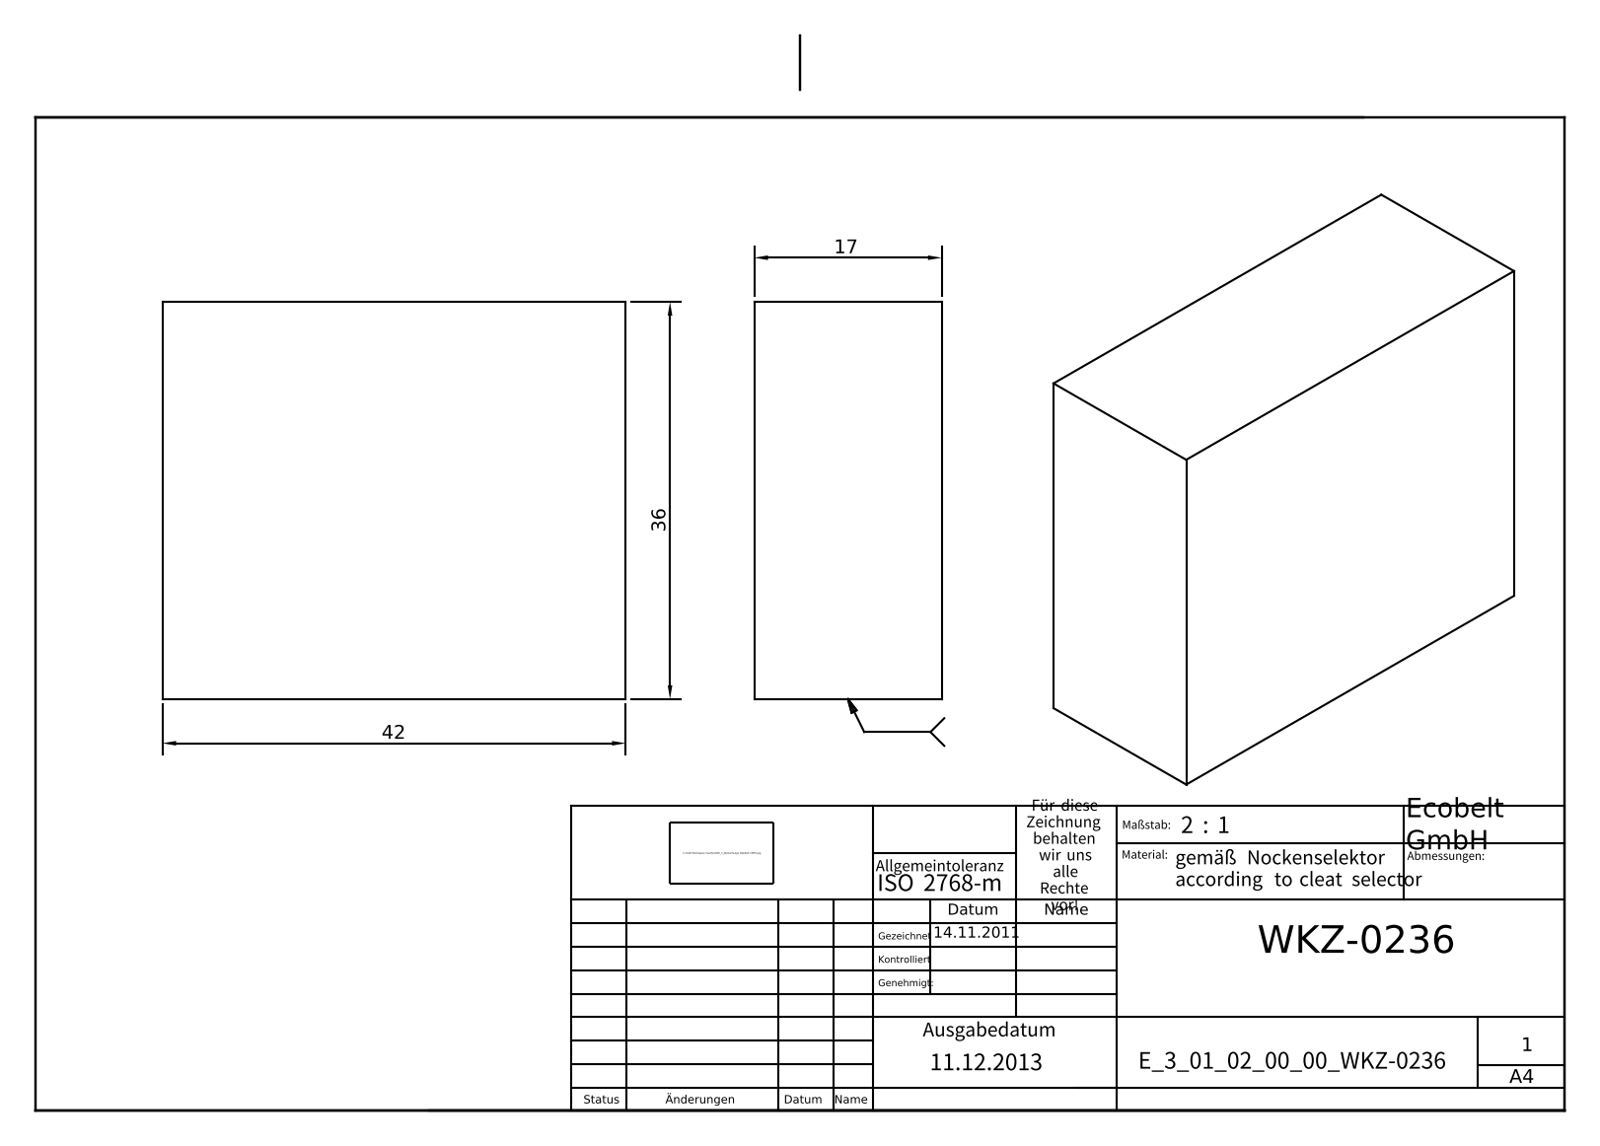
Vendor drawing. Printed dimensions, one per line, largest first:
42
36
17
